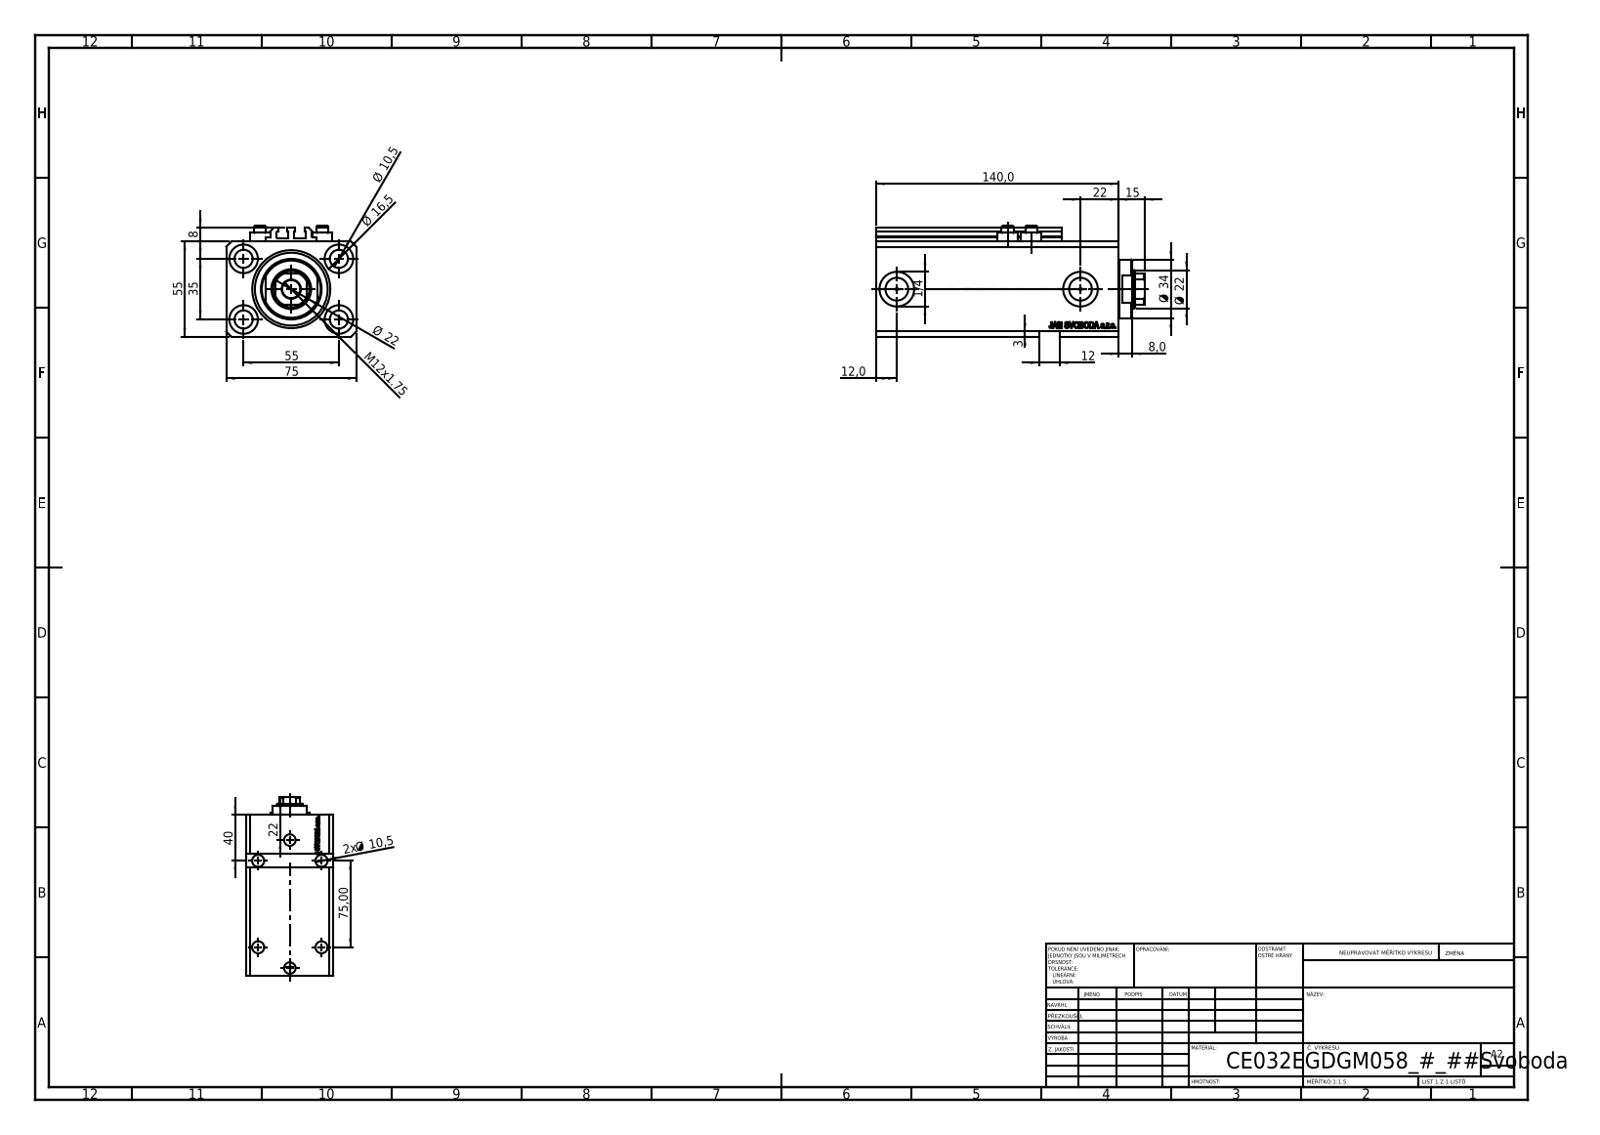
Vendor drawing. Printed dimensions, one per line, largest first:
140,0
75
75,00
55
55
40
35
Ø 34
Ø 22
22
Ø 22
22
Ø 16,5
15
M12x1.75
12,0
12
Ø 10,5
2x Ø 10,5
8
8,0
3
1/4
